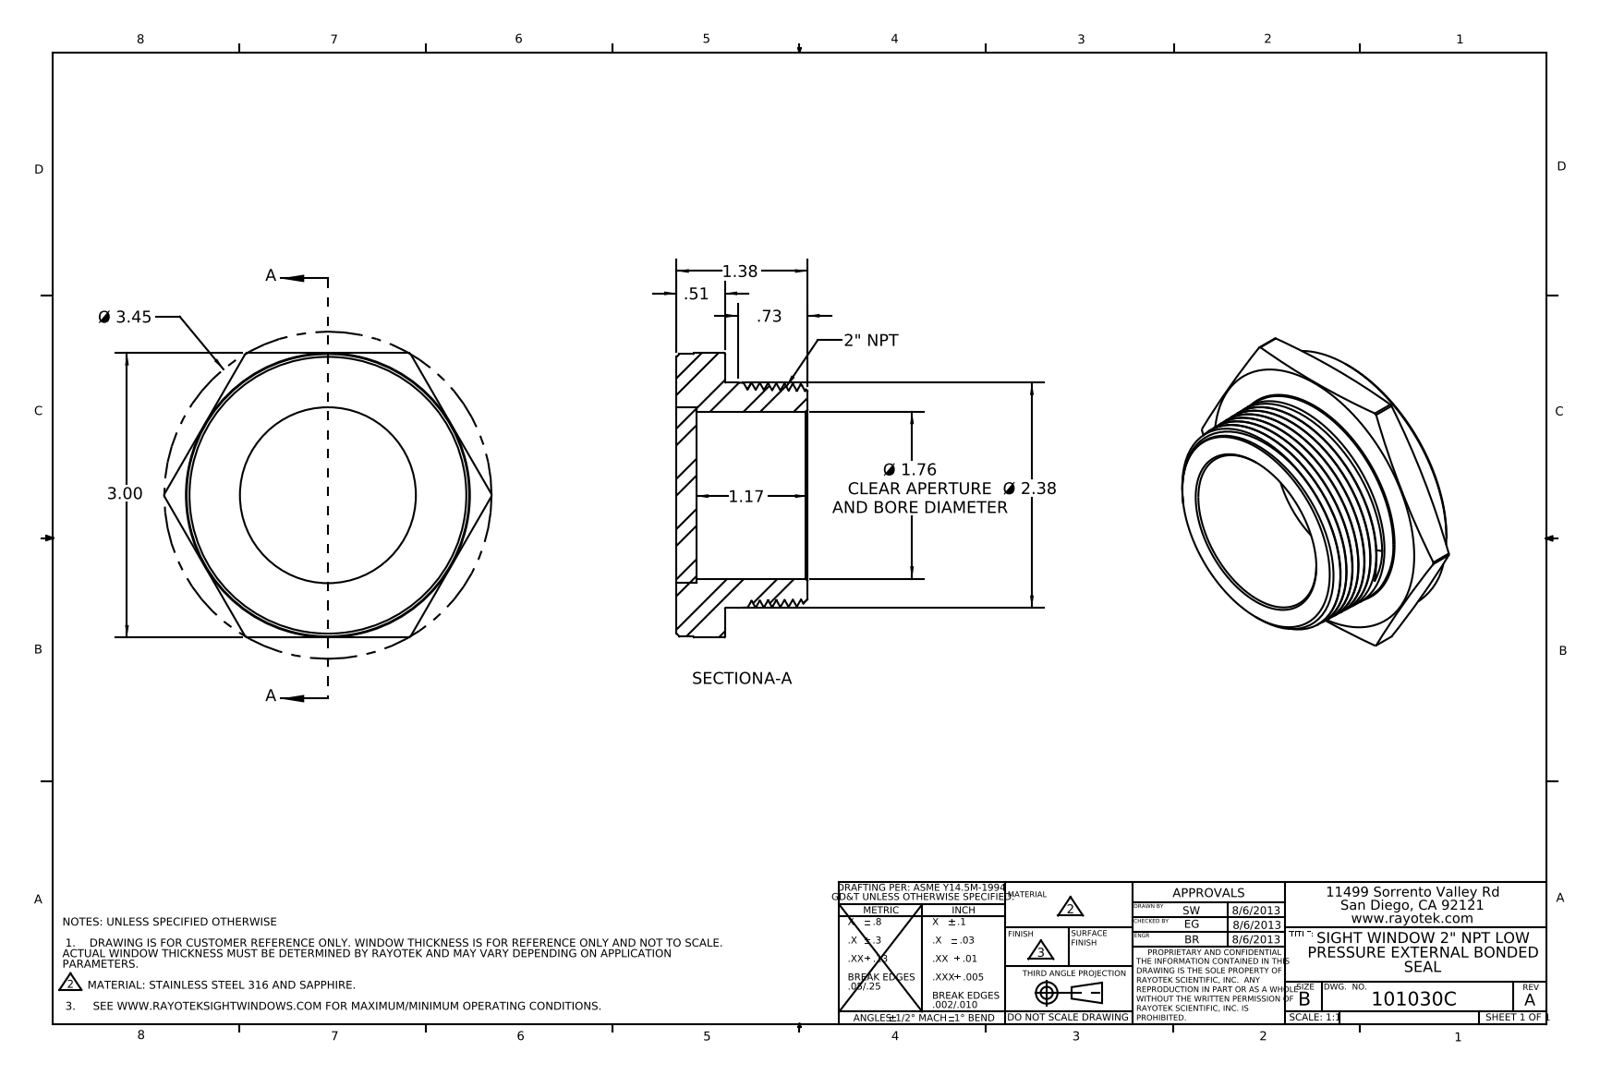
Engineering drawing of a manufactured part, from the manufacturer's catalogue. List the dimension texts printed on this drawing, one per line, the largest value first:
Ø 3.45
3.00
Ø 2.38
Ø 1.76 CLEAR APERTURE AND BORE DIAMETER
1.38
1.17
.73
.51
